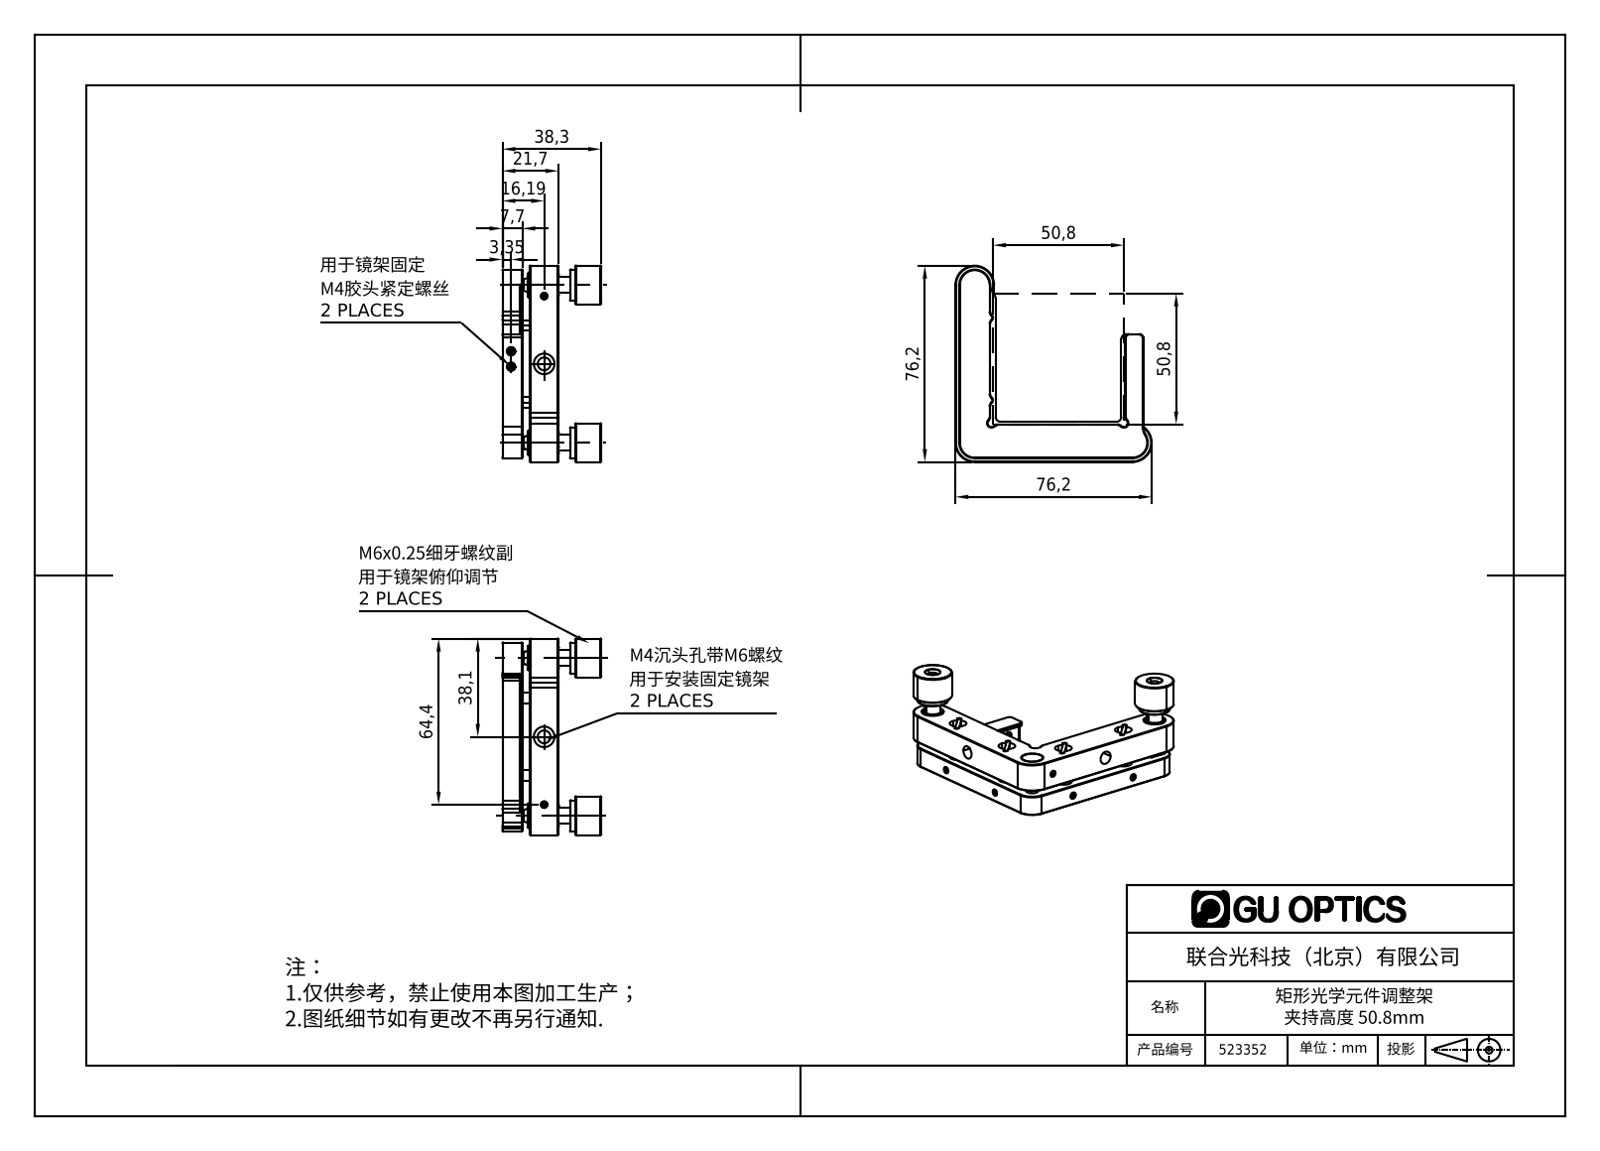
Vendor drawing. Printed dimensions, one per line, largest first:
76,2
76,2
64,4
50,8
50,8
38,3
38,1
21,7
16,19
7,7
3,35
